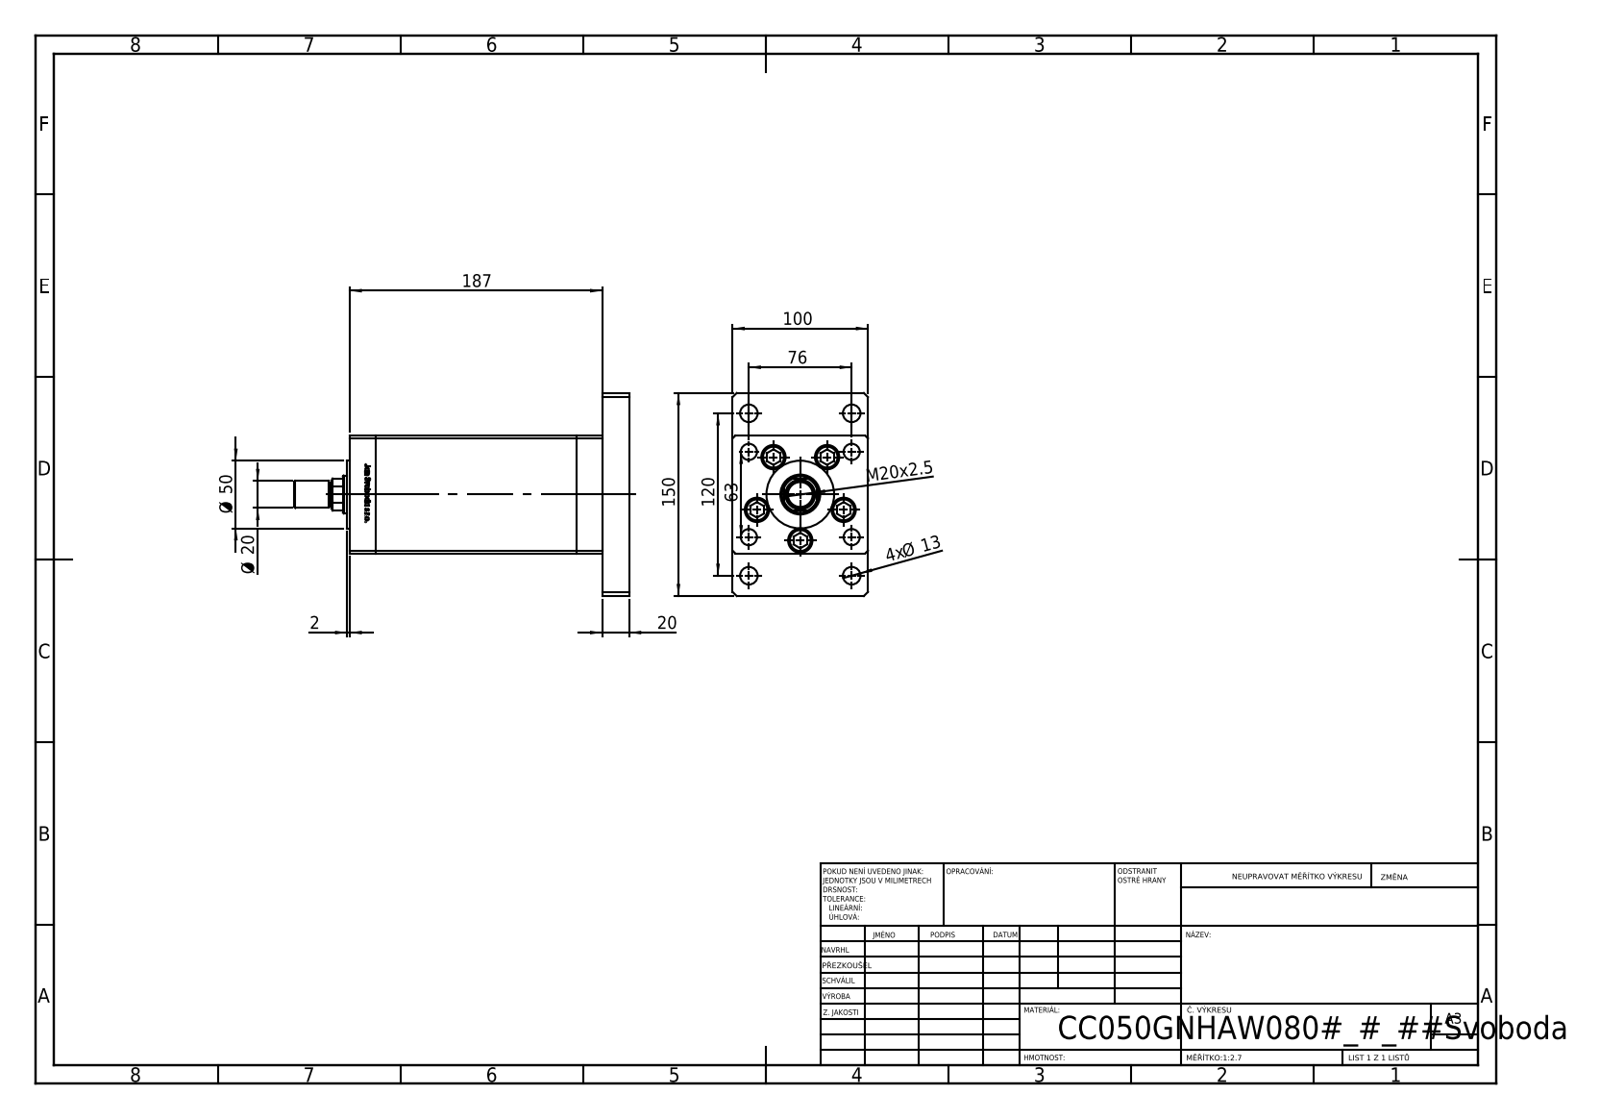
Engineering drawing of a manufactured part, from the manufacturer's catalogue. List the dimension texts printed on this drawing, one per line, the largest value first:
187
150
120
100
76
63
Ø 50
20
Ø 20
M20x2.5
4x Ø 13
2
